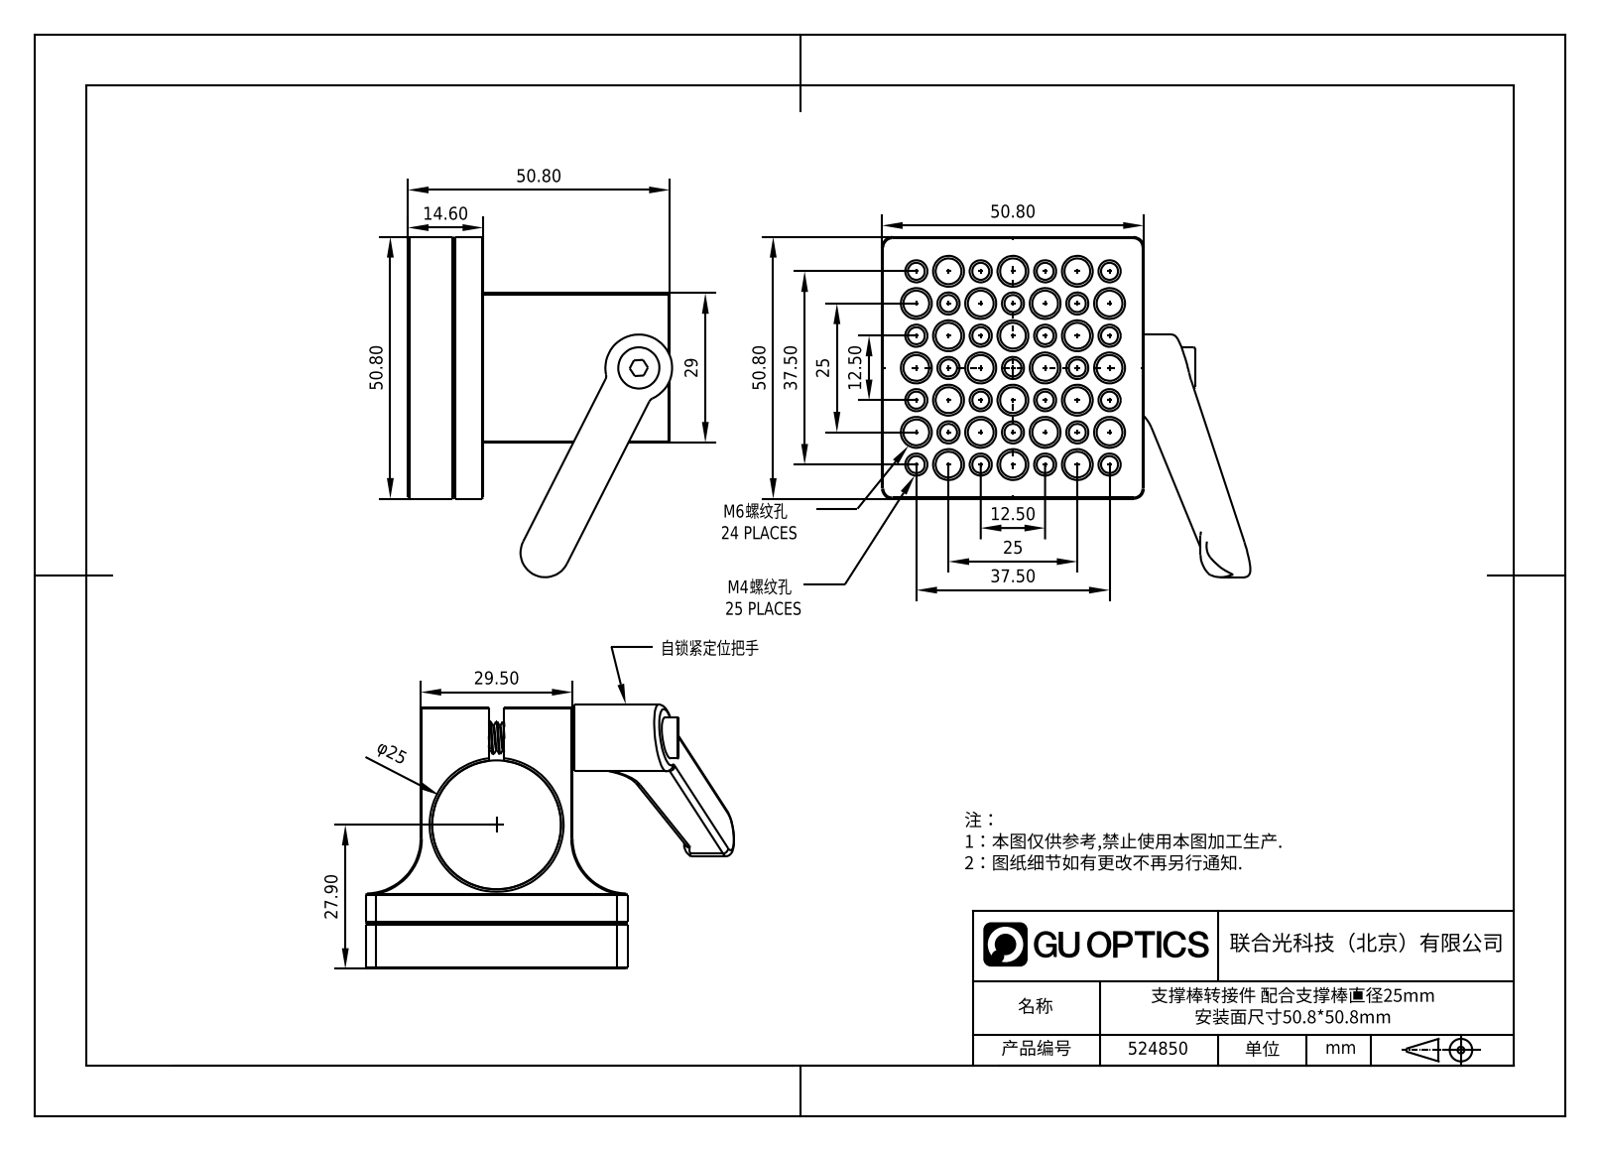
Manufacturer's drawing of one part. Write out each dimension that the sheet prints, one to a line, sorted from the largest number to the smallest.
50.80
50.80
50.80
50.80
37.50
37.50
29.50
29
27.90
25
25
φ25
14.60
12.50
12.50
